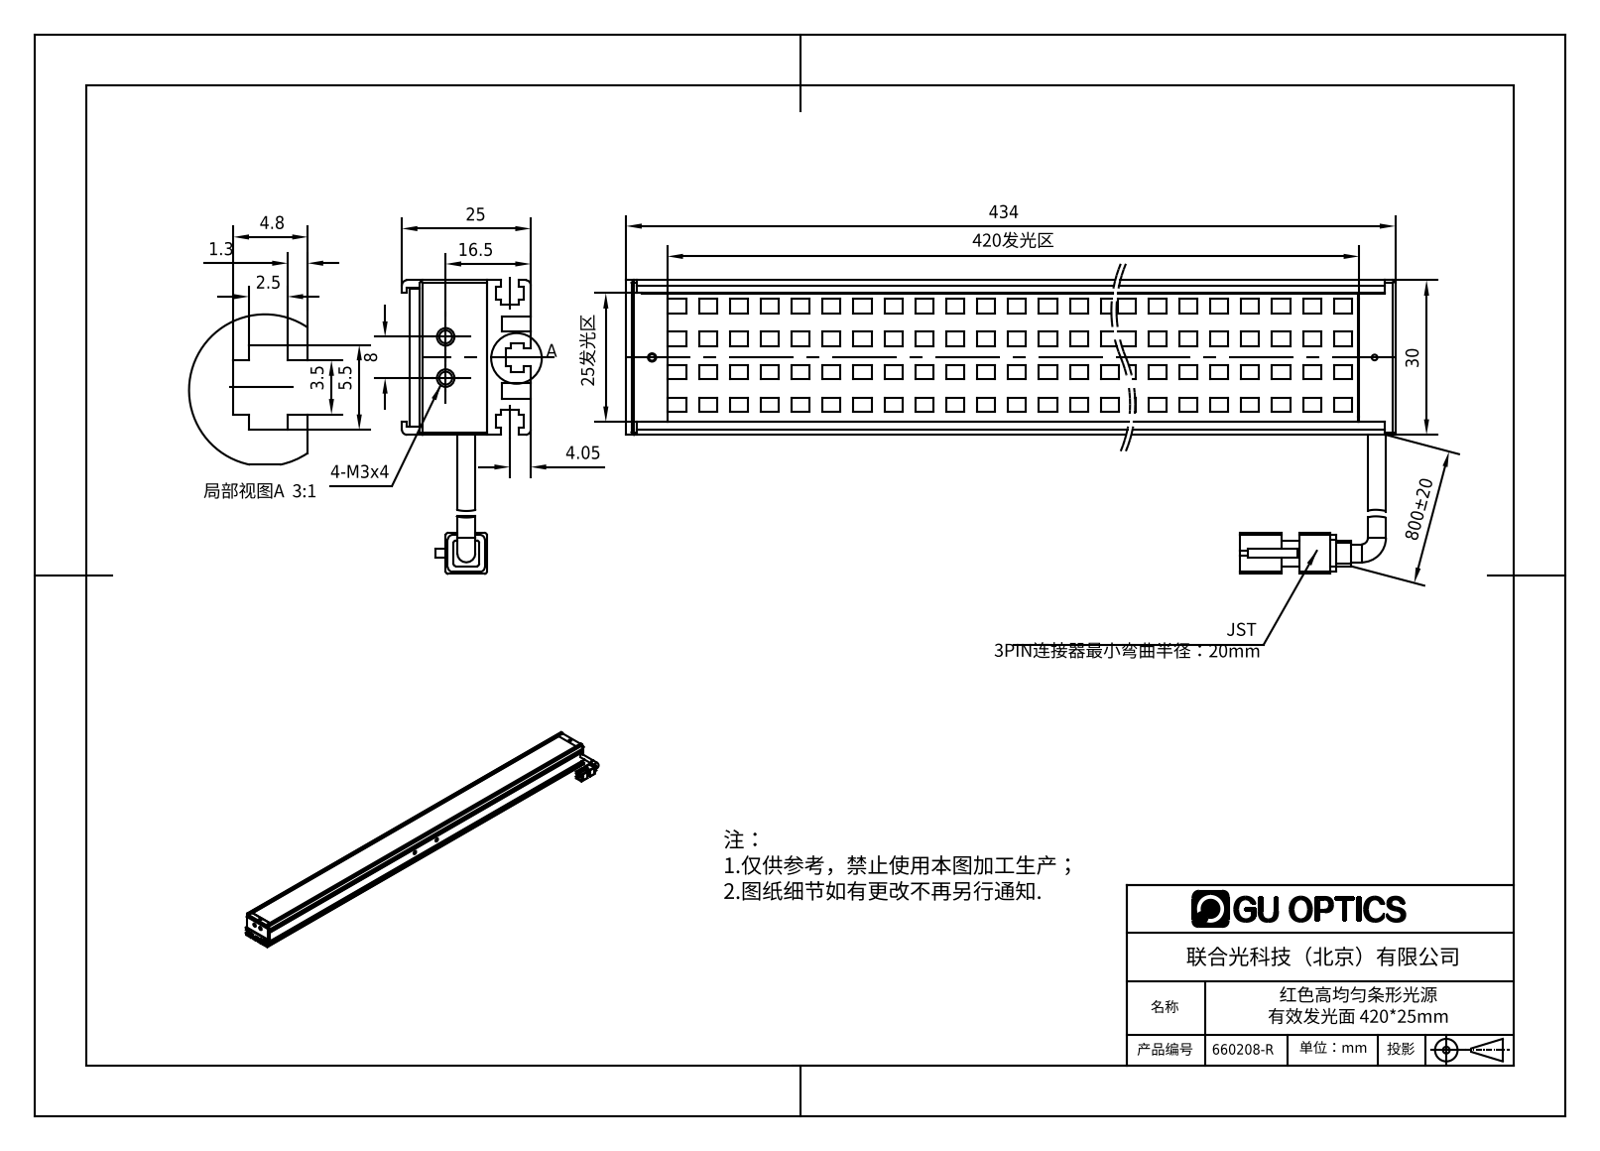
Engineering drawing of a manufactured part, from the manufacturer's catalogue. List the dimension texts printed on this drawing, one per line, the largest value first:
800±20
434
420发光区
30
25发光区
25
16.5
8
5.5
4.8
4.05
3.5
2.5
1.3
